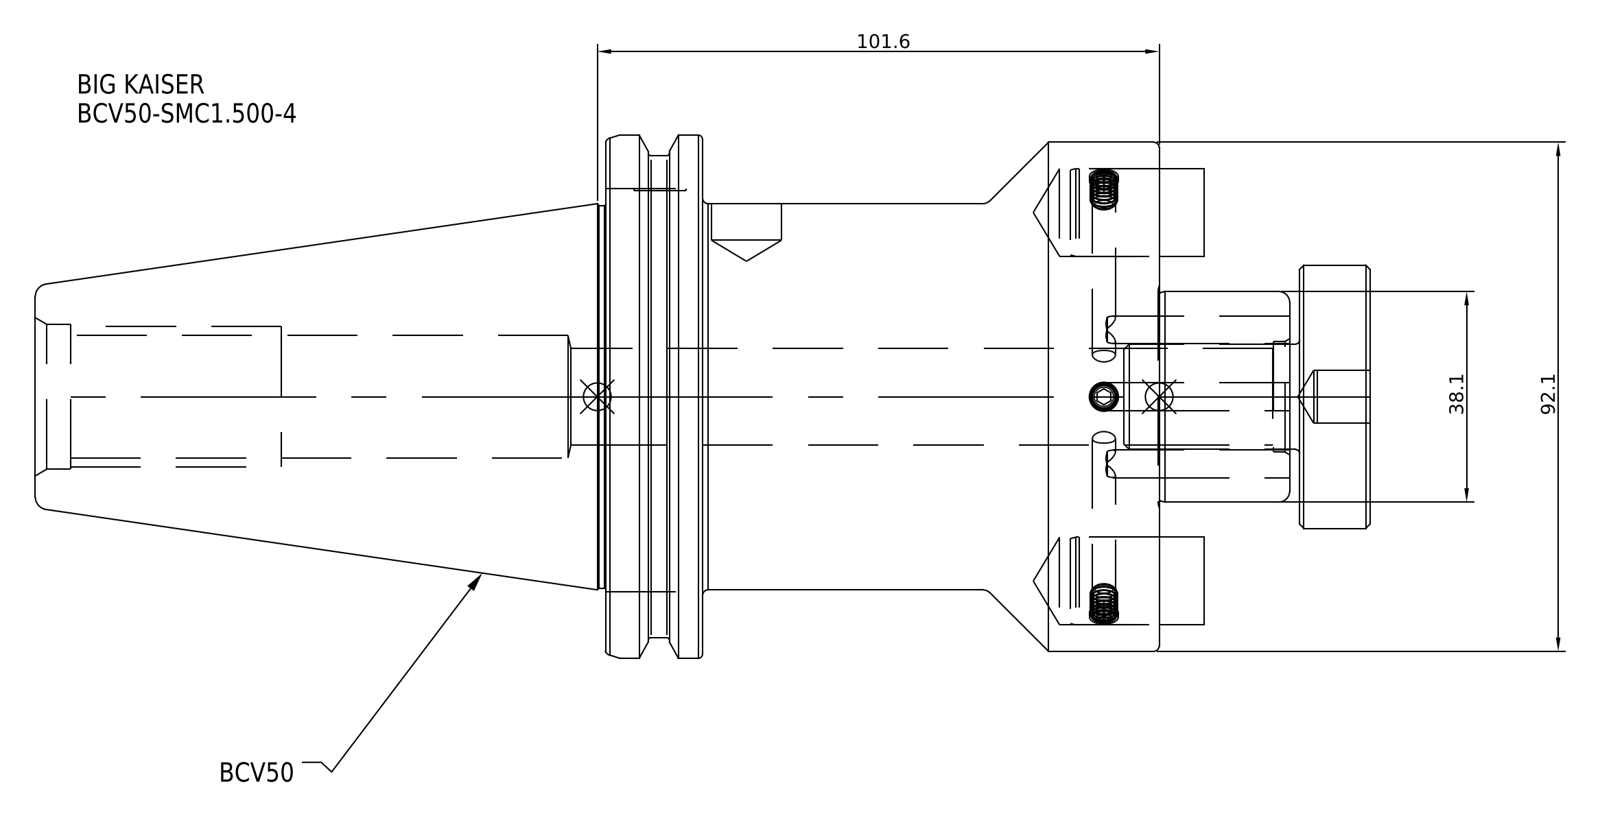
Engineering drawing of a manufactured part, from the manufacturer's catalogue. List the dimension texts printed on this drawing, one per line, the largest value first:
101.6
92.1
38.1
